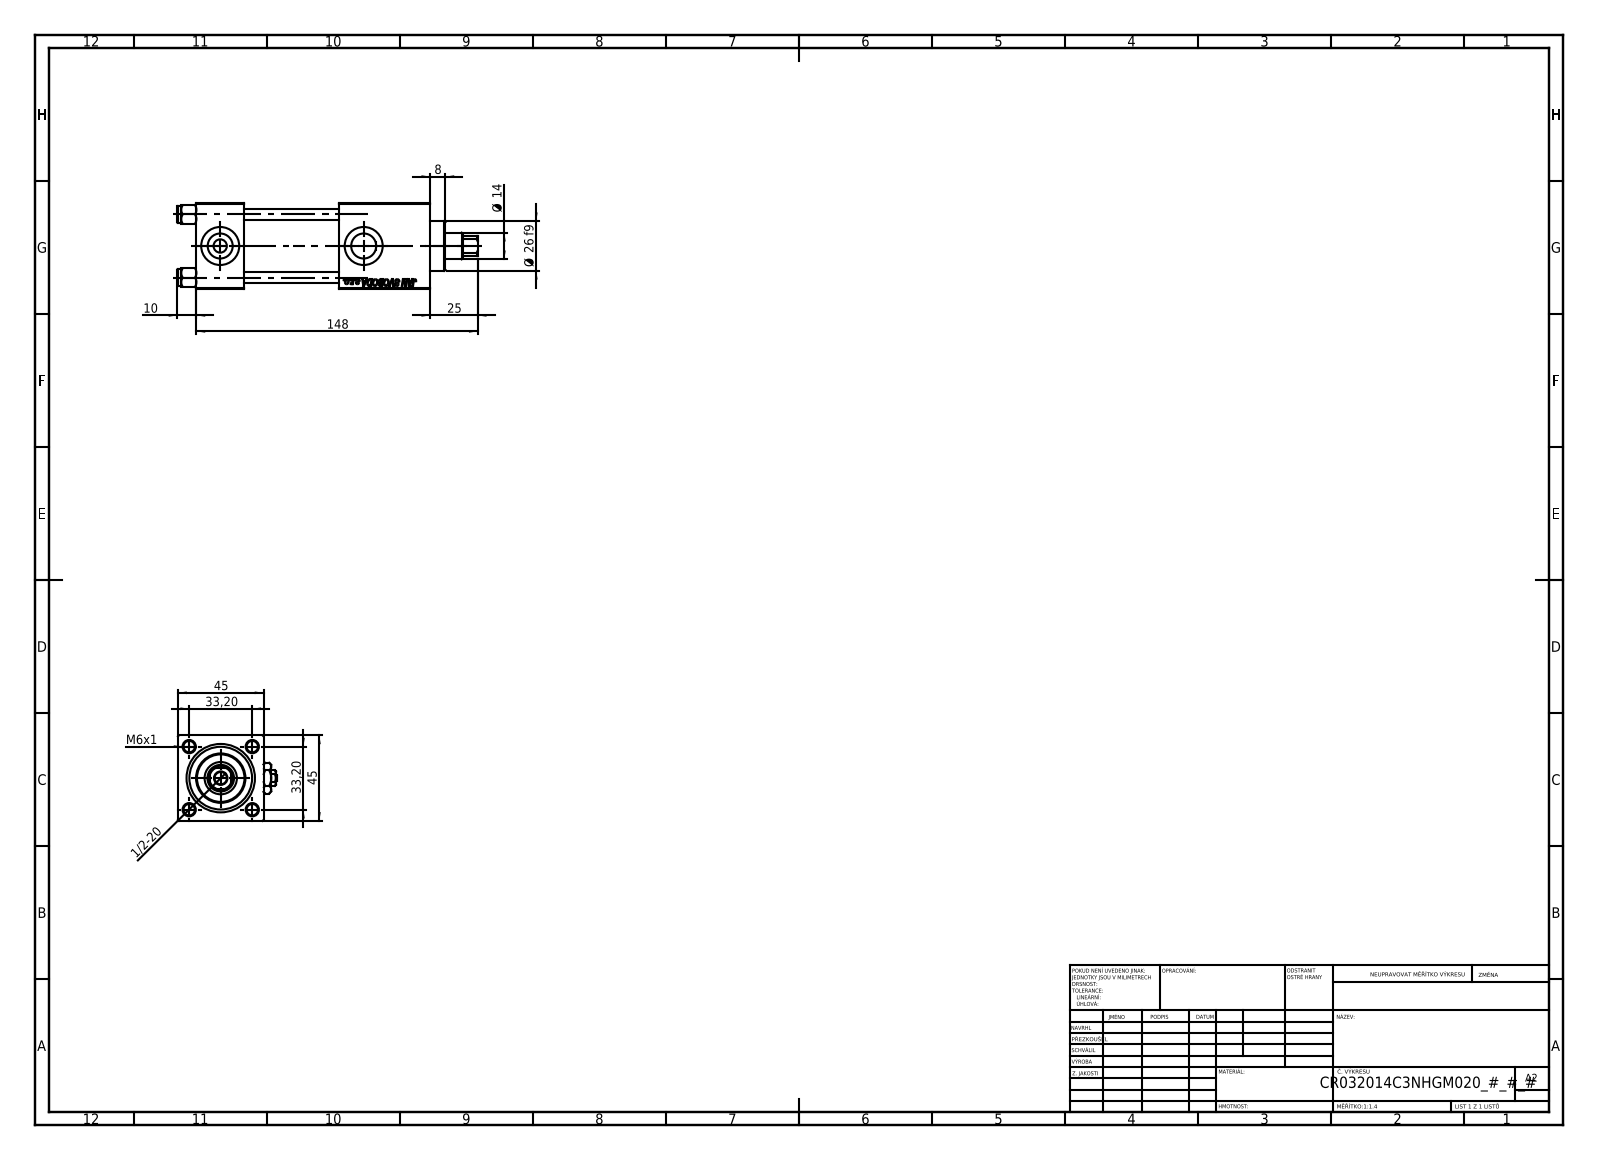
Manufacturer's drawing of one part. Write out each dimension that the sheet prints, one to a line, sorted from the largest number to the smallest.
148
45
45
33,20
33,20
Ø 26 f9
25
Ø 14
10
8
M6x1
1/2-20
